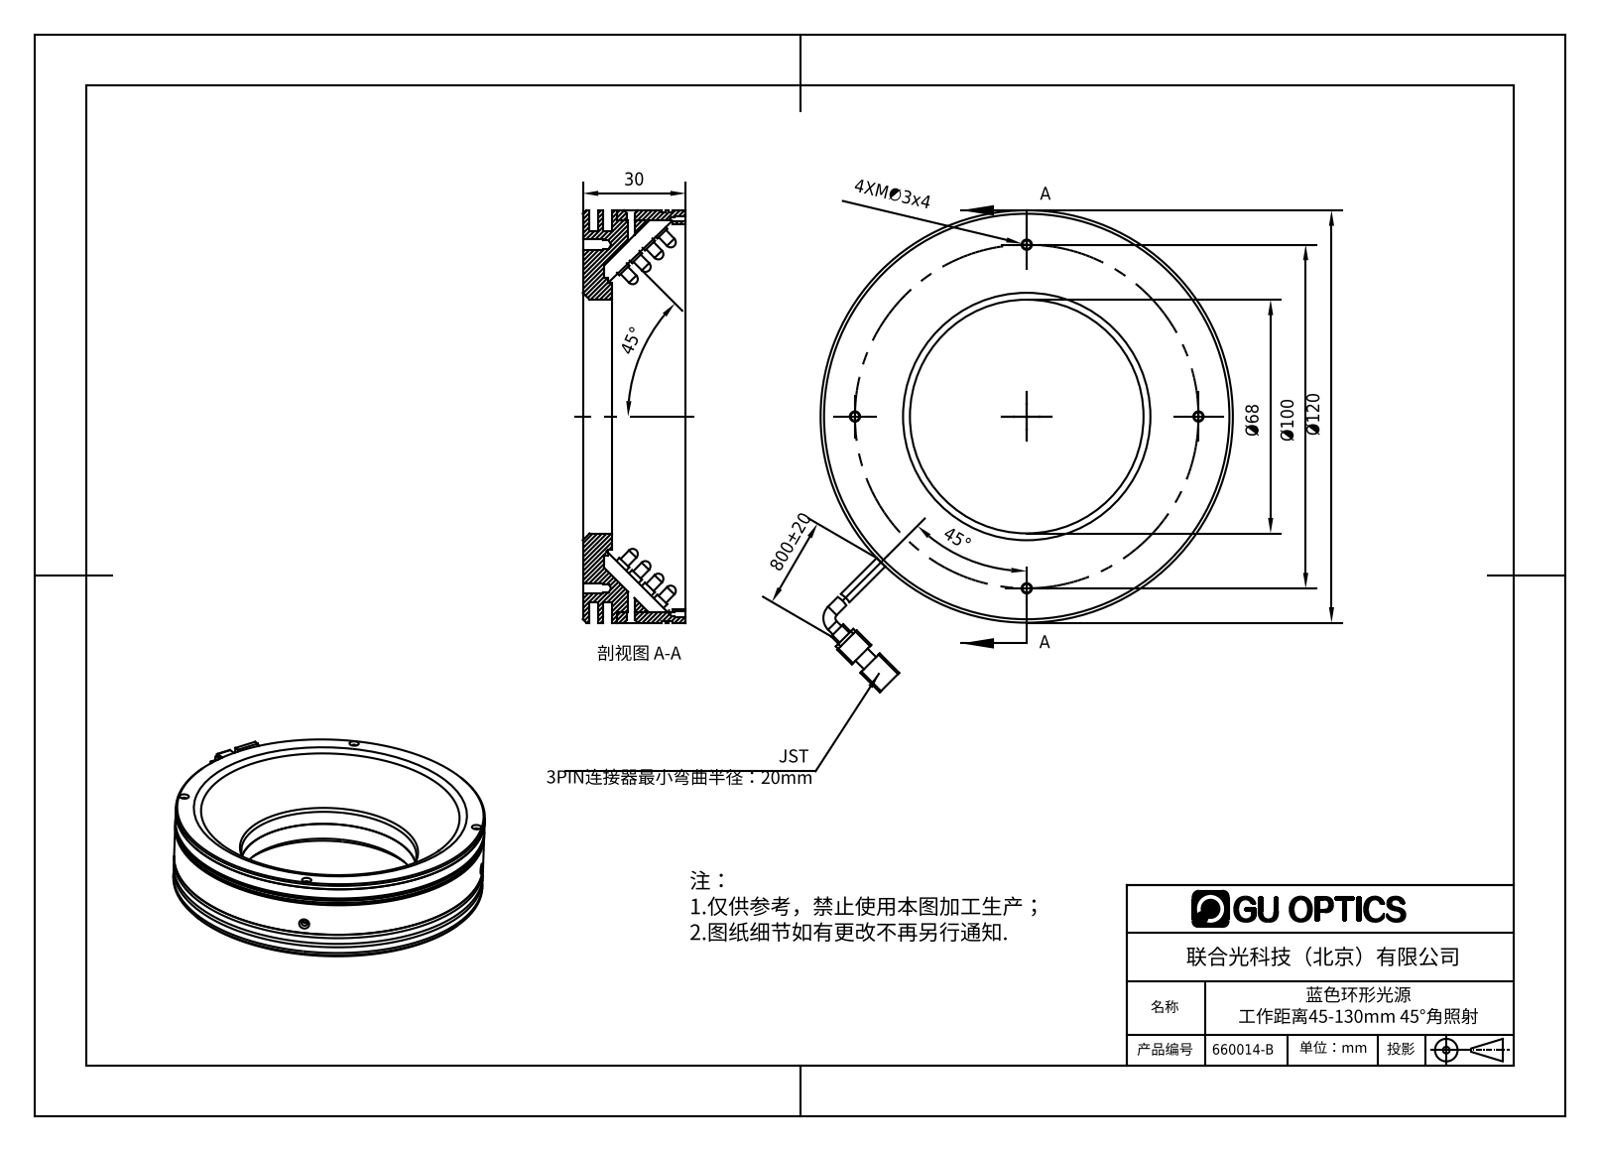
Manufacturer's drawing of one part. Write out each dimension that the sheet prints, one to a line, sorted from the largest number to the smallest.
800±20
Ø120
Ø100
Ø68
45°
45°
30
4XM∅3x4
